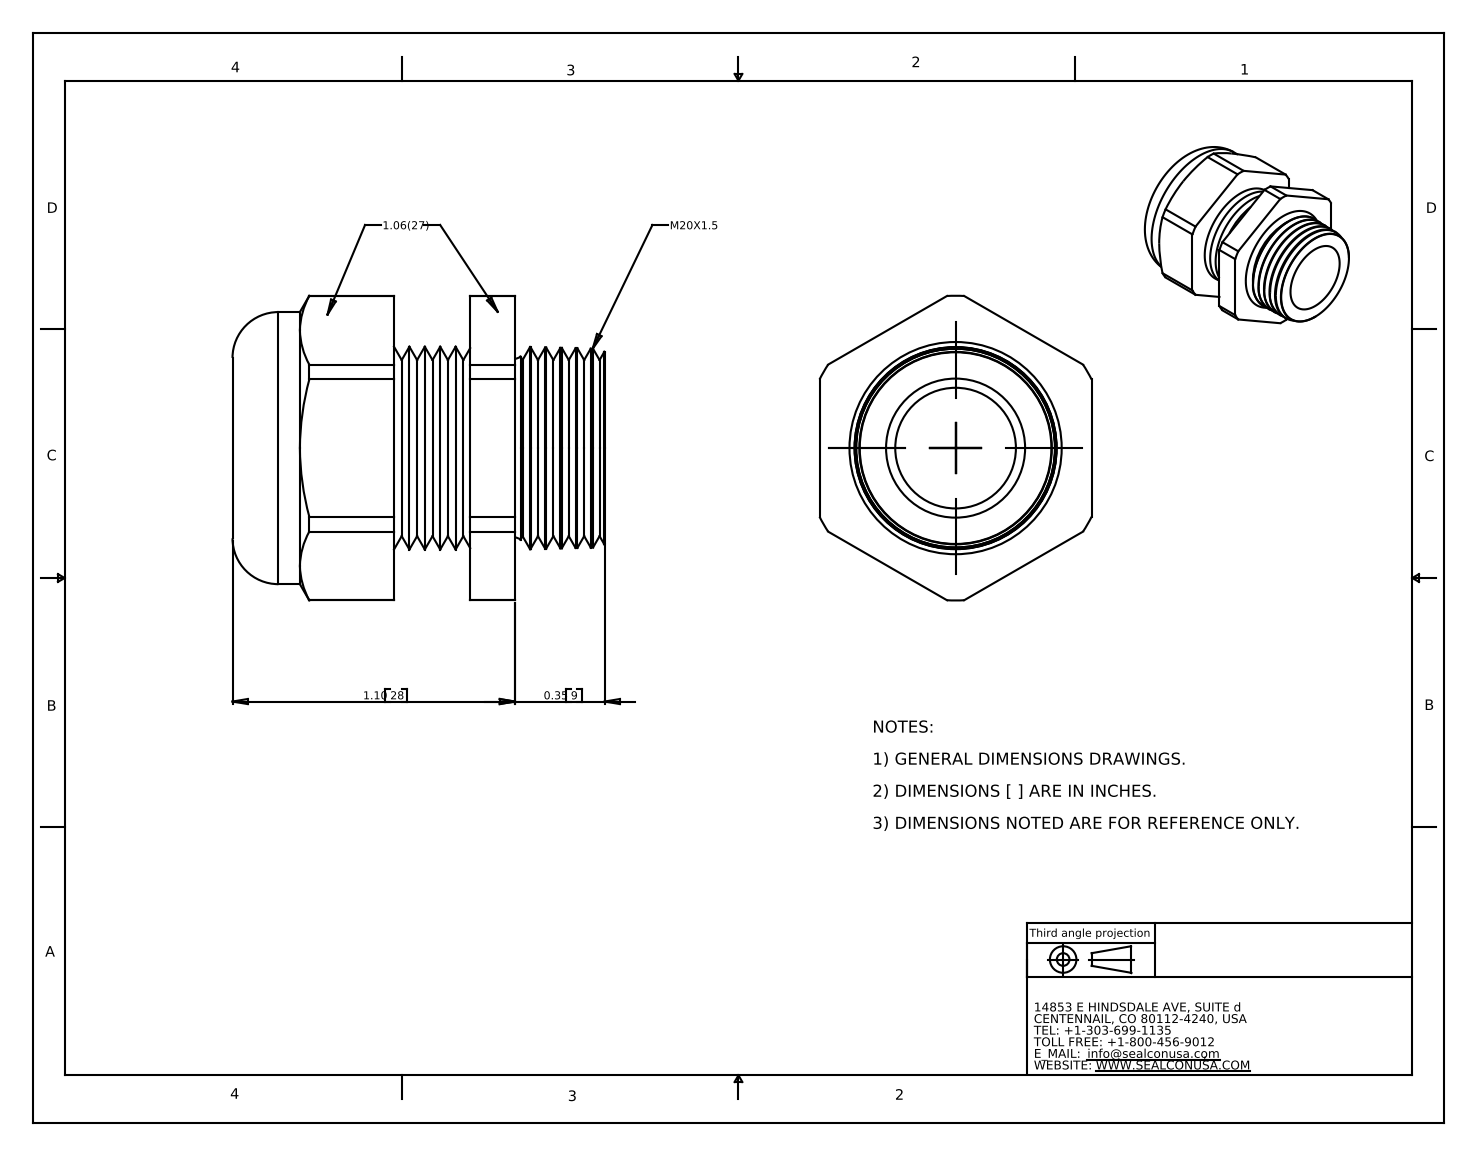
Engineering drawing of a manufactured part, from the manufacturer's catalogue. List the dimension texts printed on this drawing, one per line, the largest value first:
1.10 28
0.35 9
